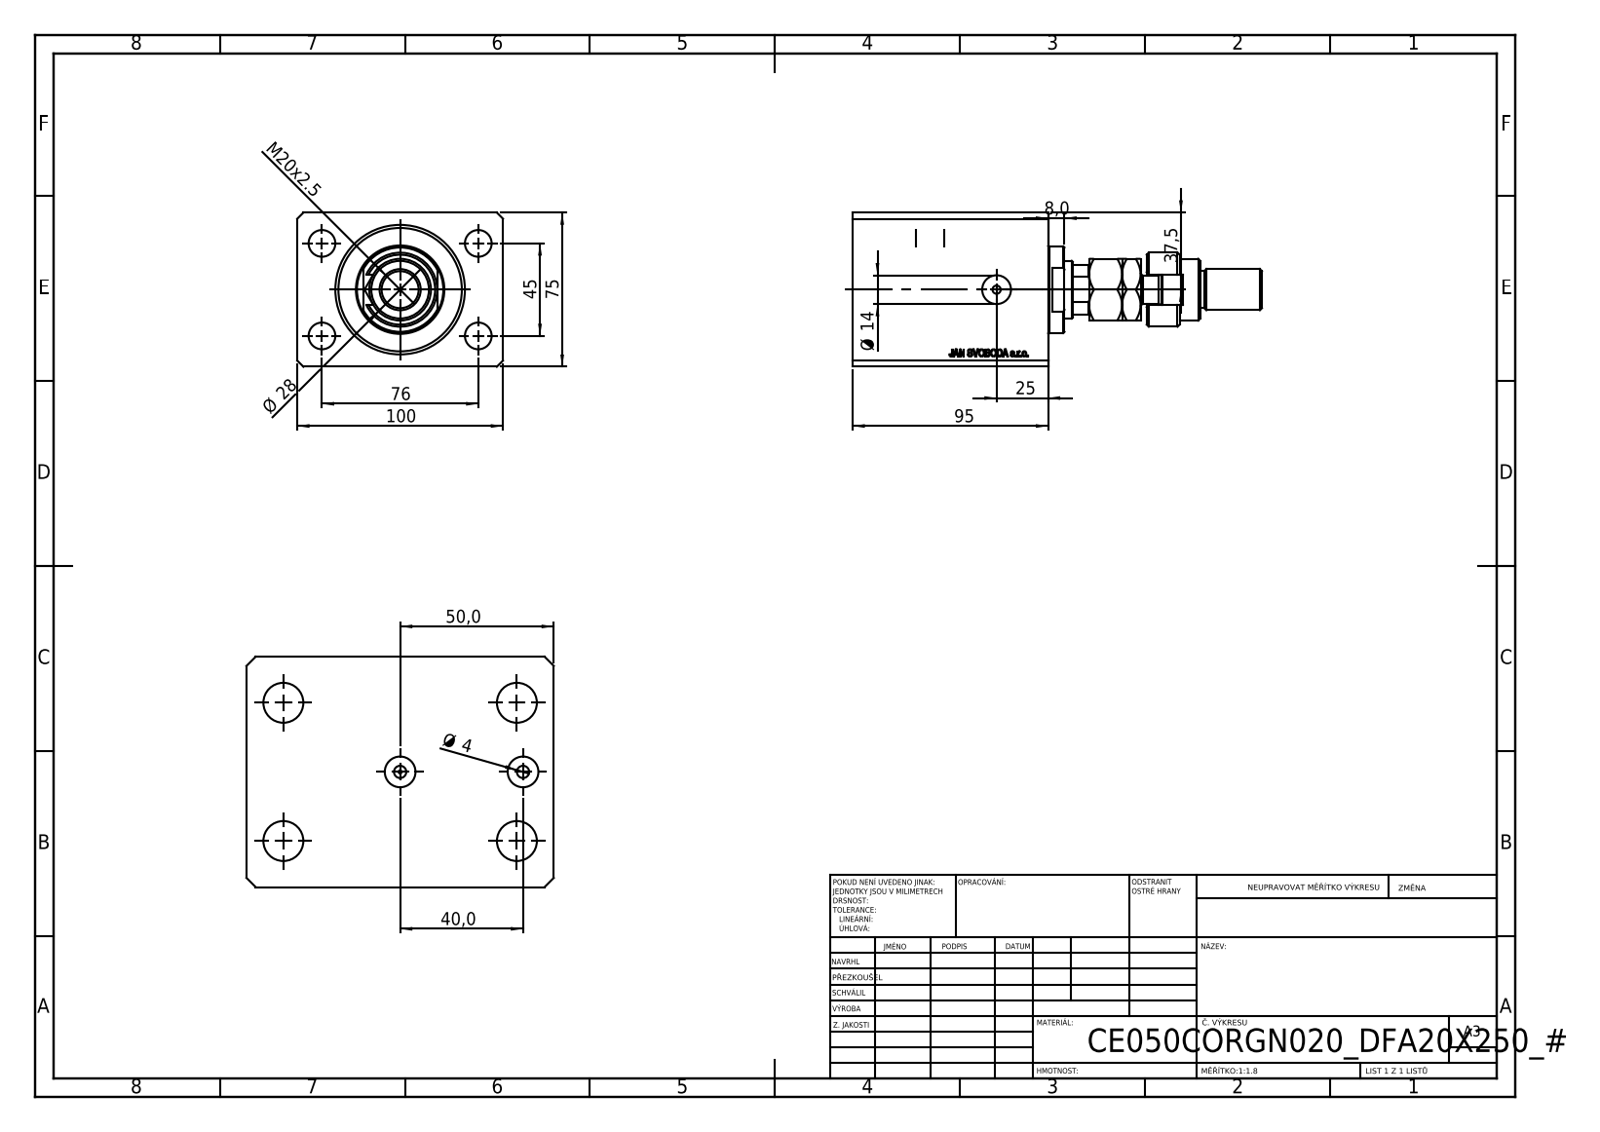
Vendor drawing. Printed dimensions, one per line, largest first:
100
95
76
75
50,0
45
40,0
37,5
Ø 28
25
M20x2.5
Ø 14
8,0
Ø 4
